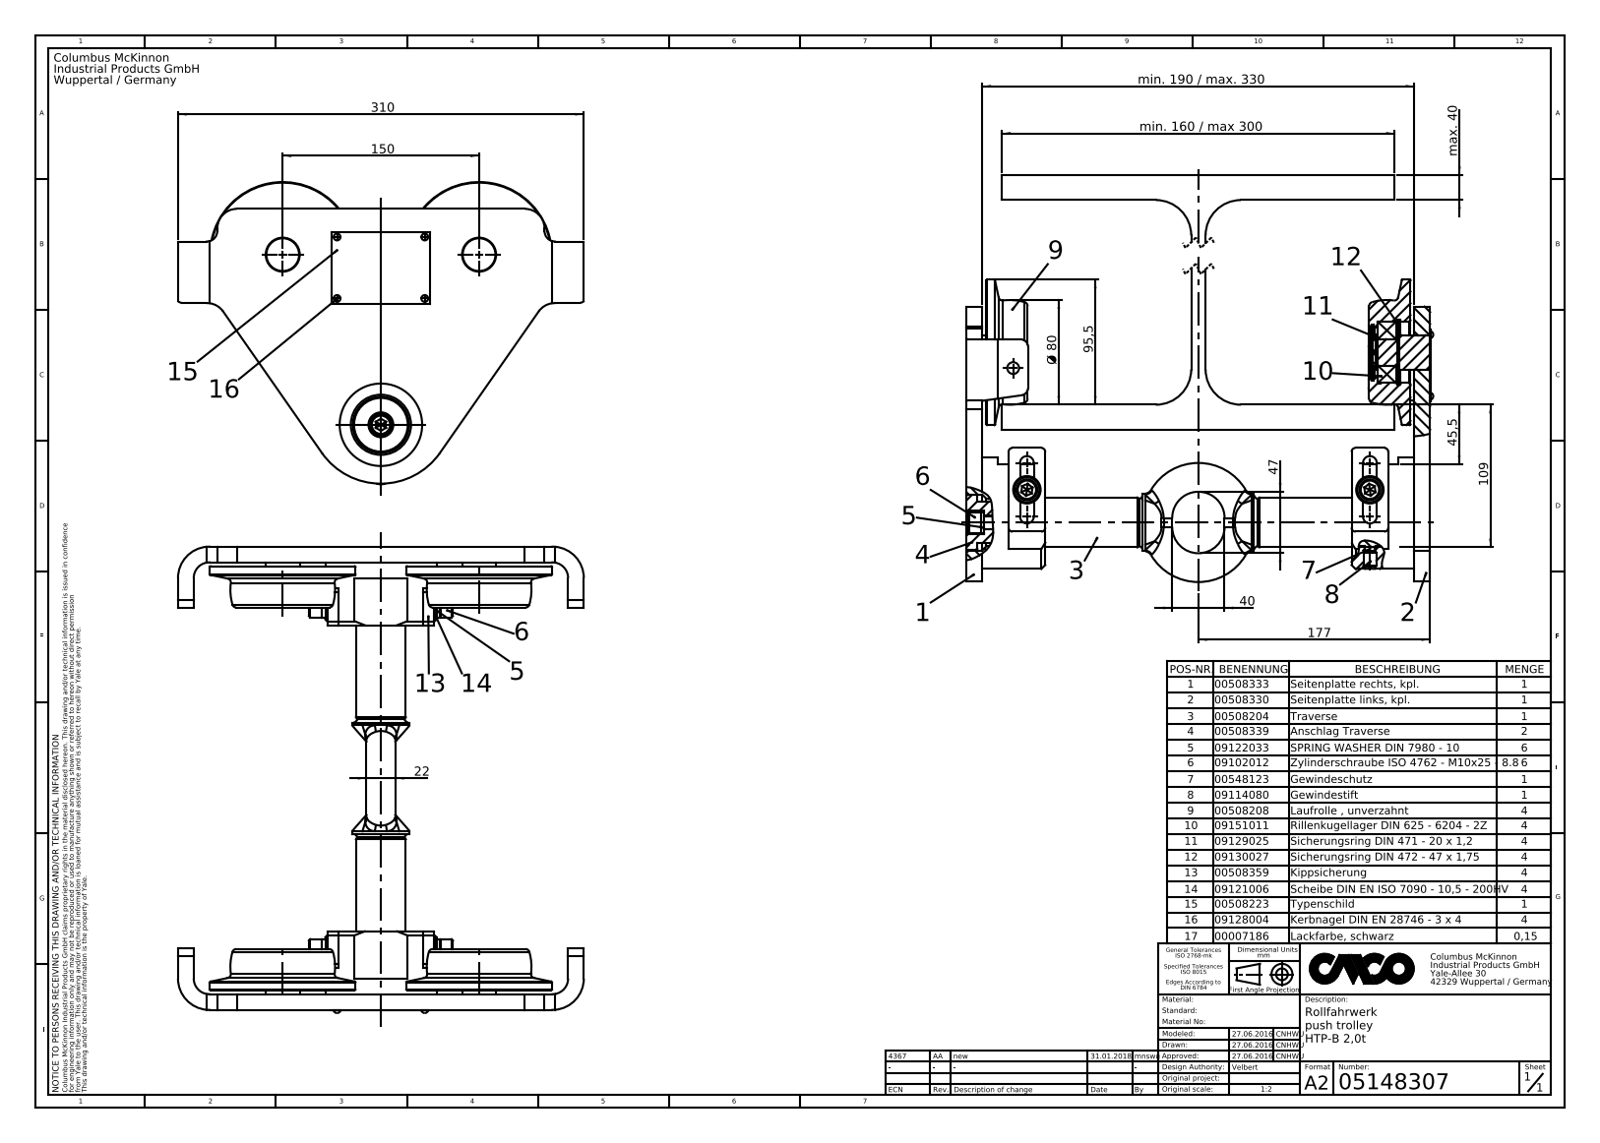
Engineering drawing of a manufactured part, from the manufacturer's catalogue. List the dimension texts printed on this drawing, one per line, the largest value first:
310
min. 190 / max. 330
177
min. 160 / max 300
150
109
95,5
Ø 80
47
45,5
40
max. 40
22
